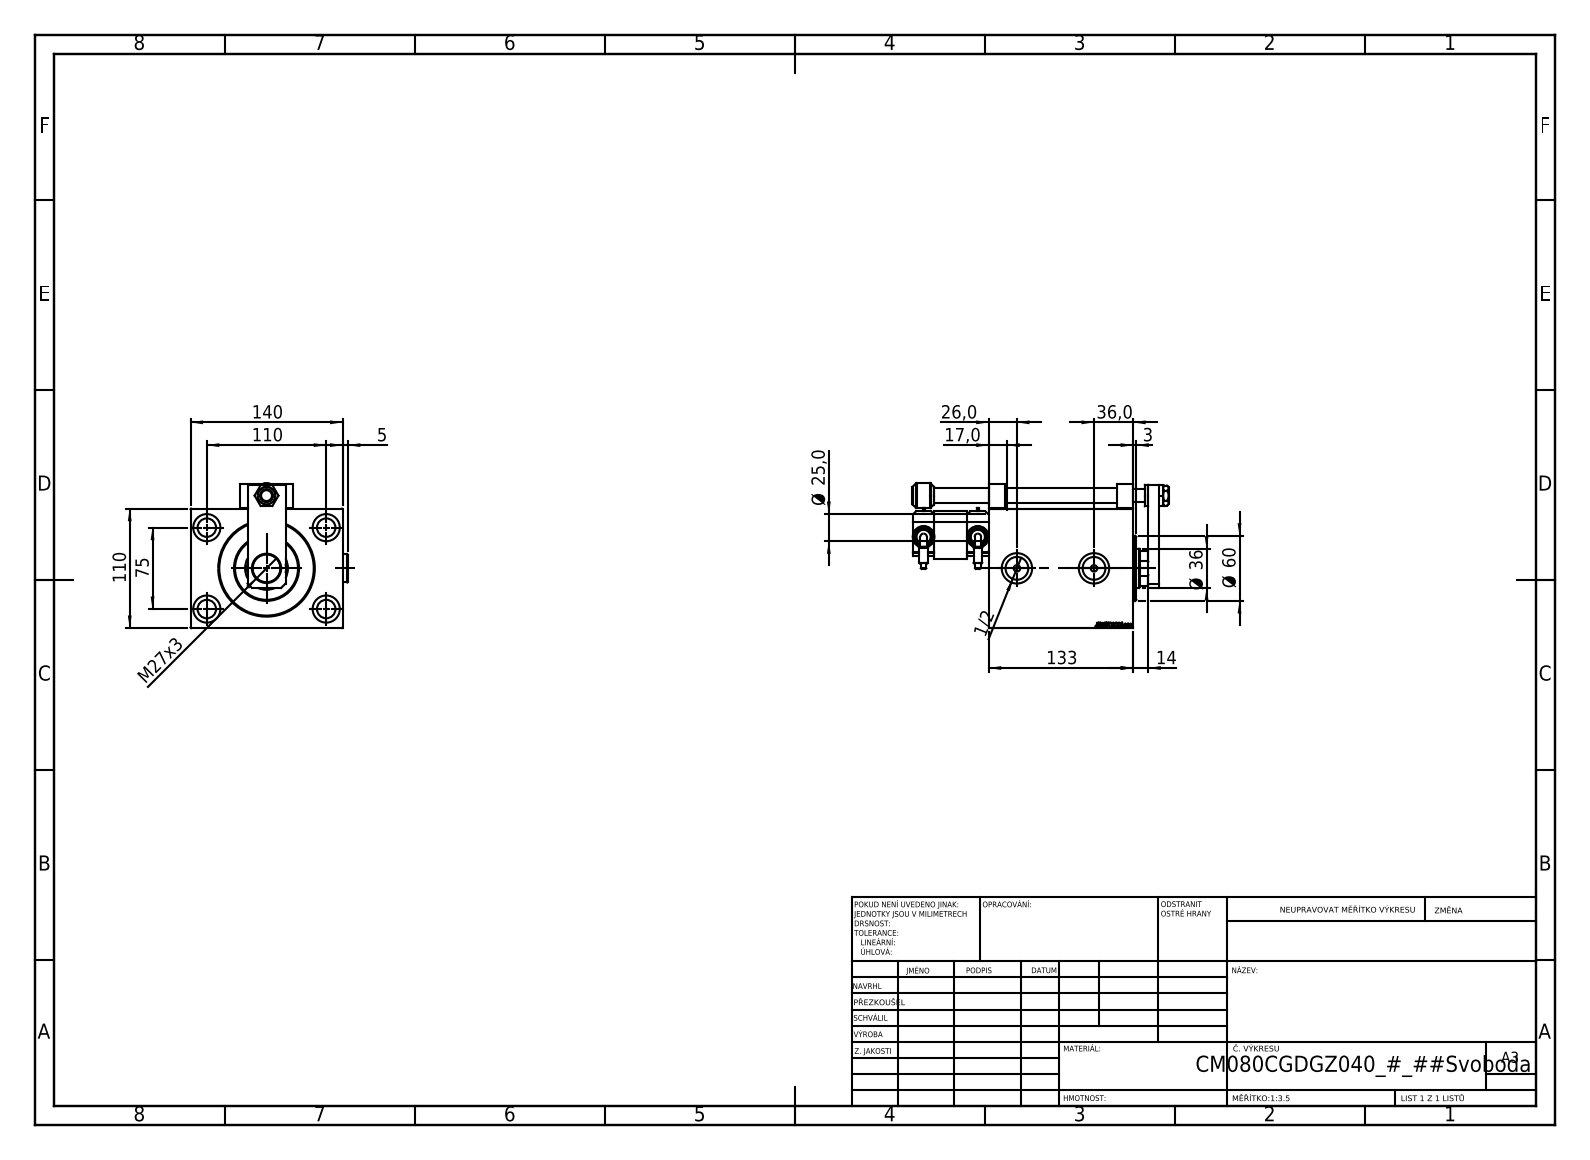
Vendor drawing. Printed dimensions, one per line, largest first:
140
133
110
110
75
Ø 60
Ø 36
36,0
M27x3
26,0
Ø 25,0
17,0
14
5
3
1/2
